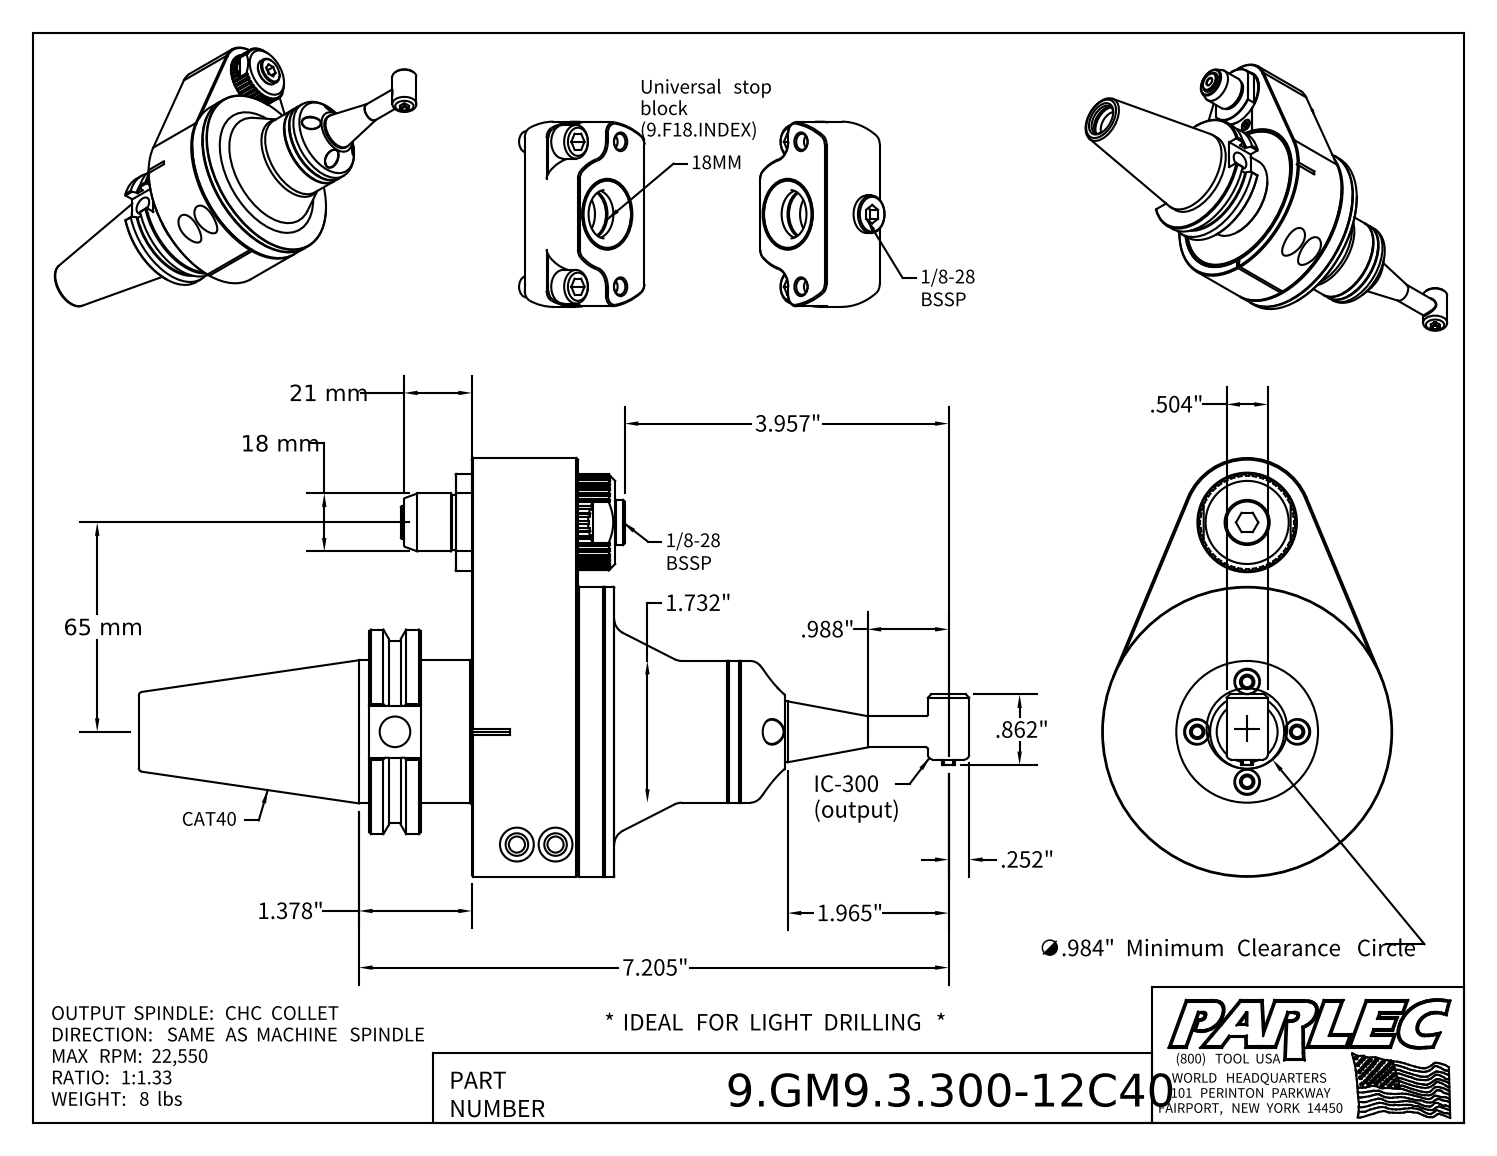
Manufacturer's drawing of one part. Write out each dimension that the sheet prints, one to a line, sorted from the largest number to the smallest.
65 mm
21 mm
18 mm
7.205"
3.957"
1.965"
1.732"
1.378"
.988"
∅.984" Minimum Clearance Circle
.862"
.504"
.252"
